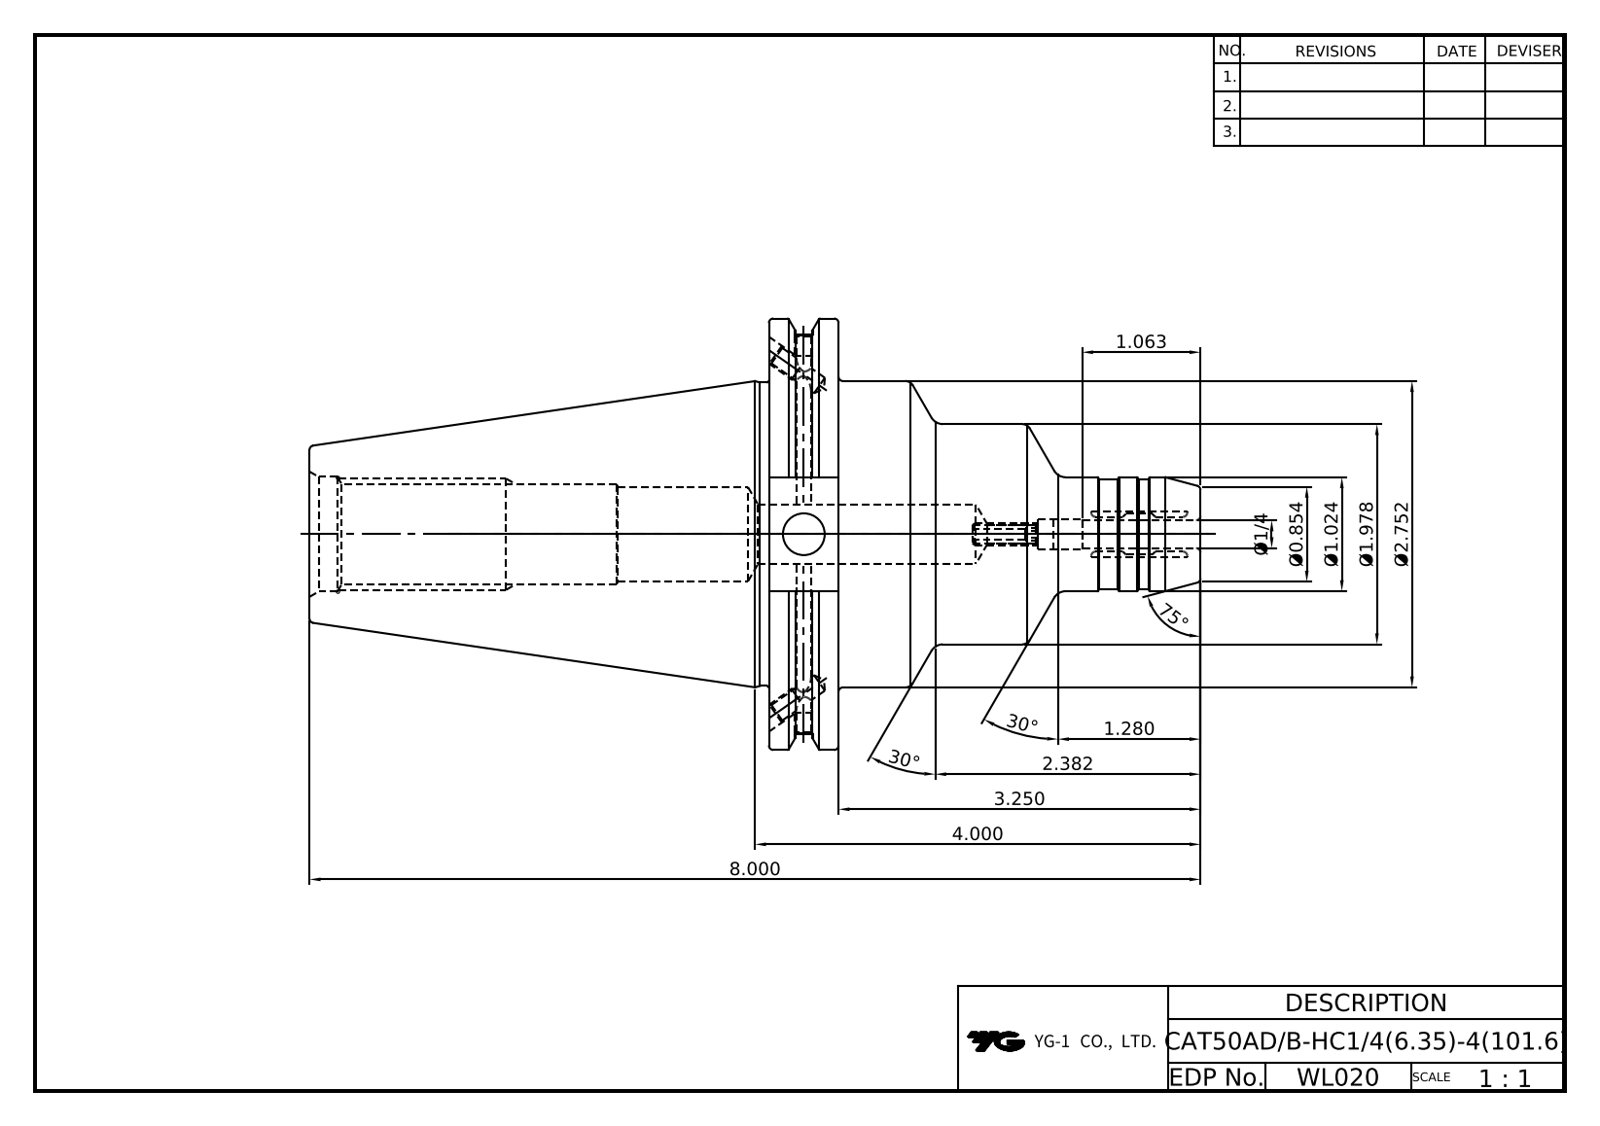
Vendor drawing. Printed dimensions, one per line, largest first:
75°
30°
30°
8.000
4.000
3.250
Ø2.752
2.382
Ø1.978
1.280
1.063
Ø1.024
Ø0.854
Ø1/4
